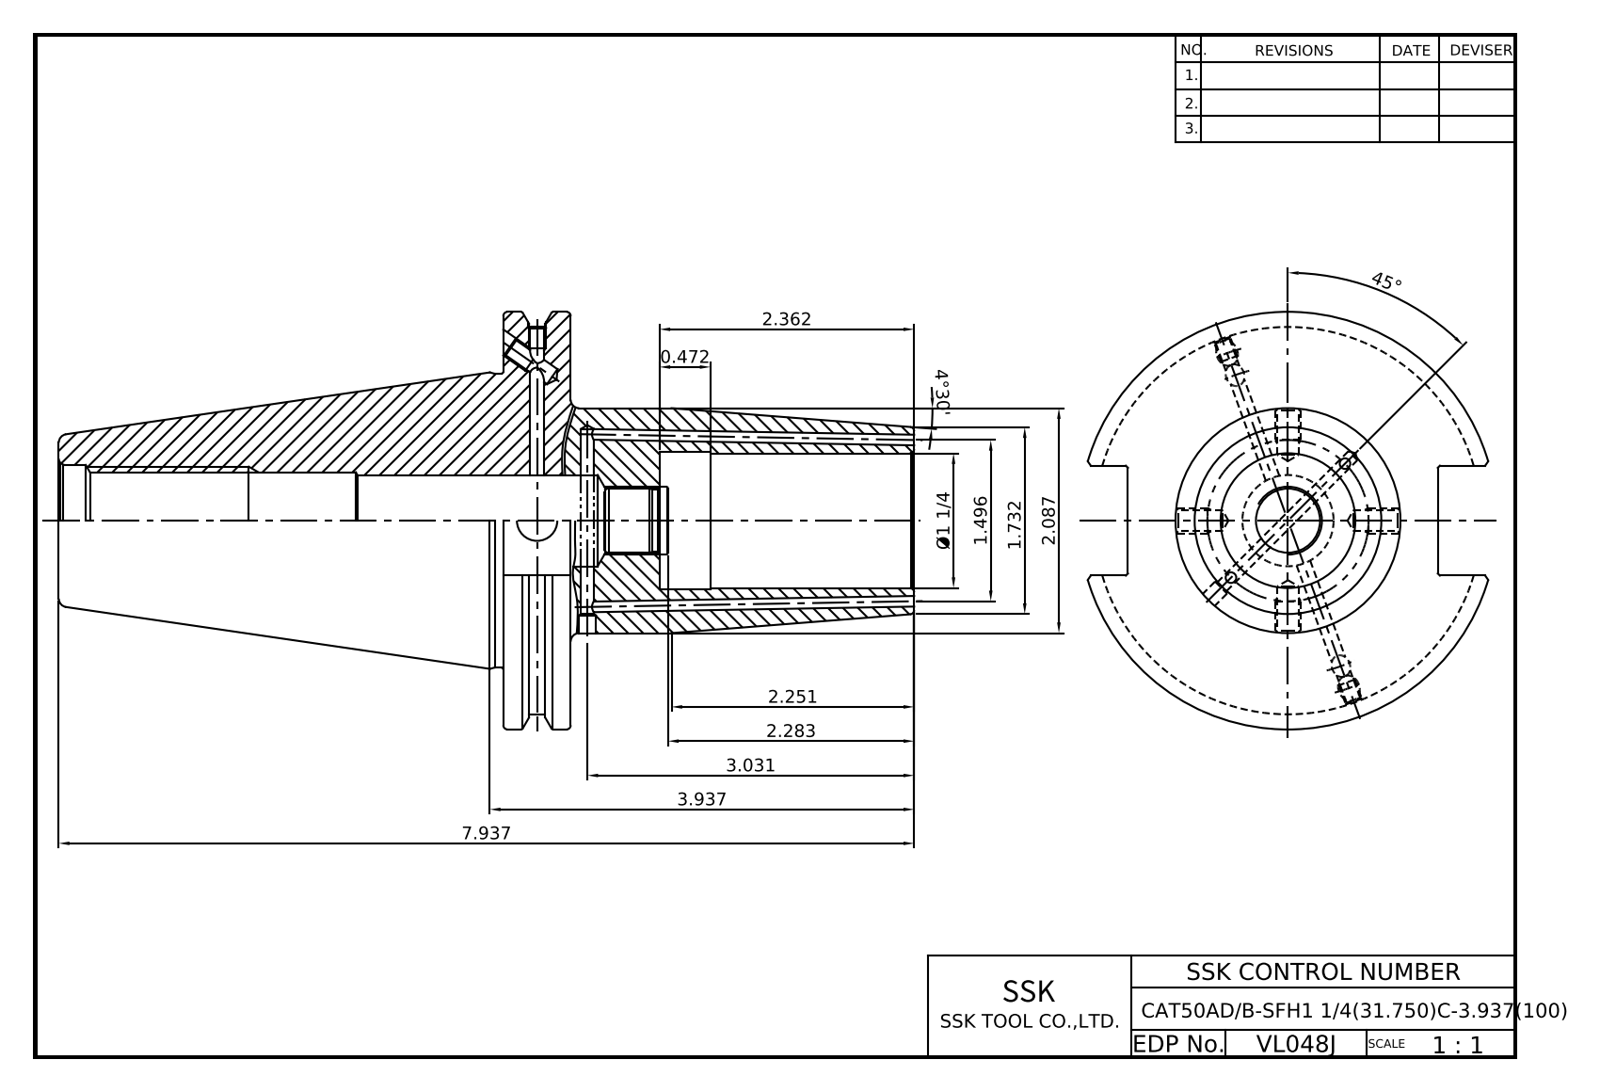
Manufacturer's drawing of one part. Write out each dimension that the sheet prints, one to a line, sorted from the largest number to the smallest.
45°
7.937
4°30'
3.937
3.031
2.362
2.283
2.251
2.087
1.732
1.496
Ø1 1/4
0.472
